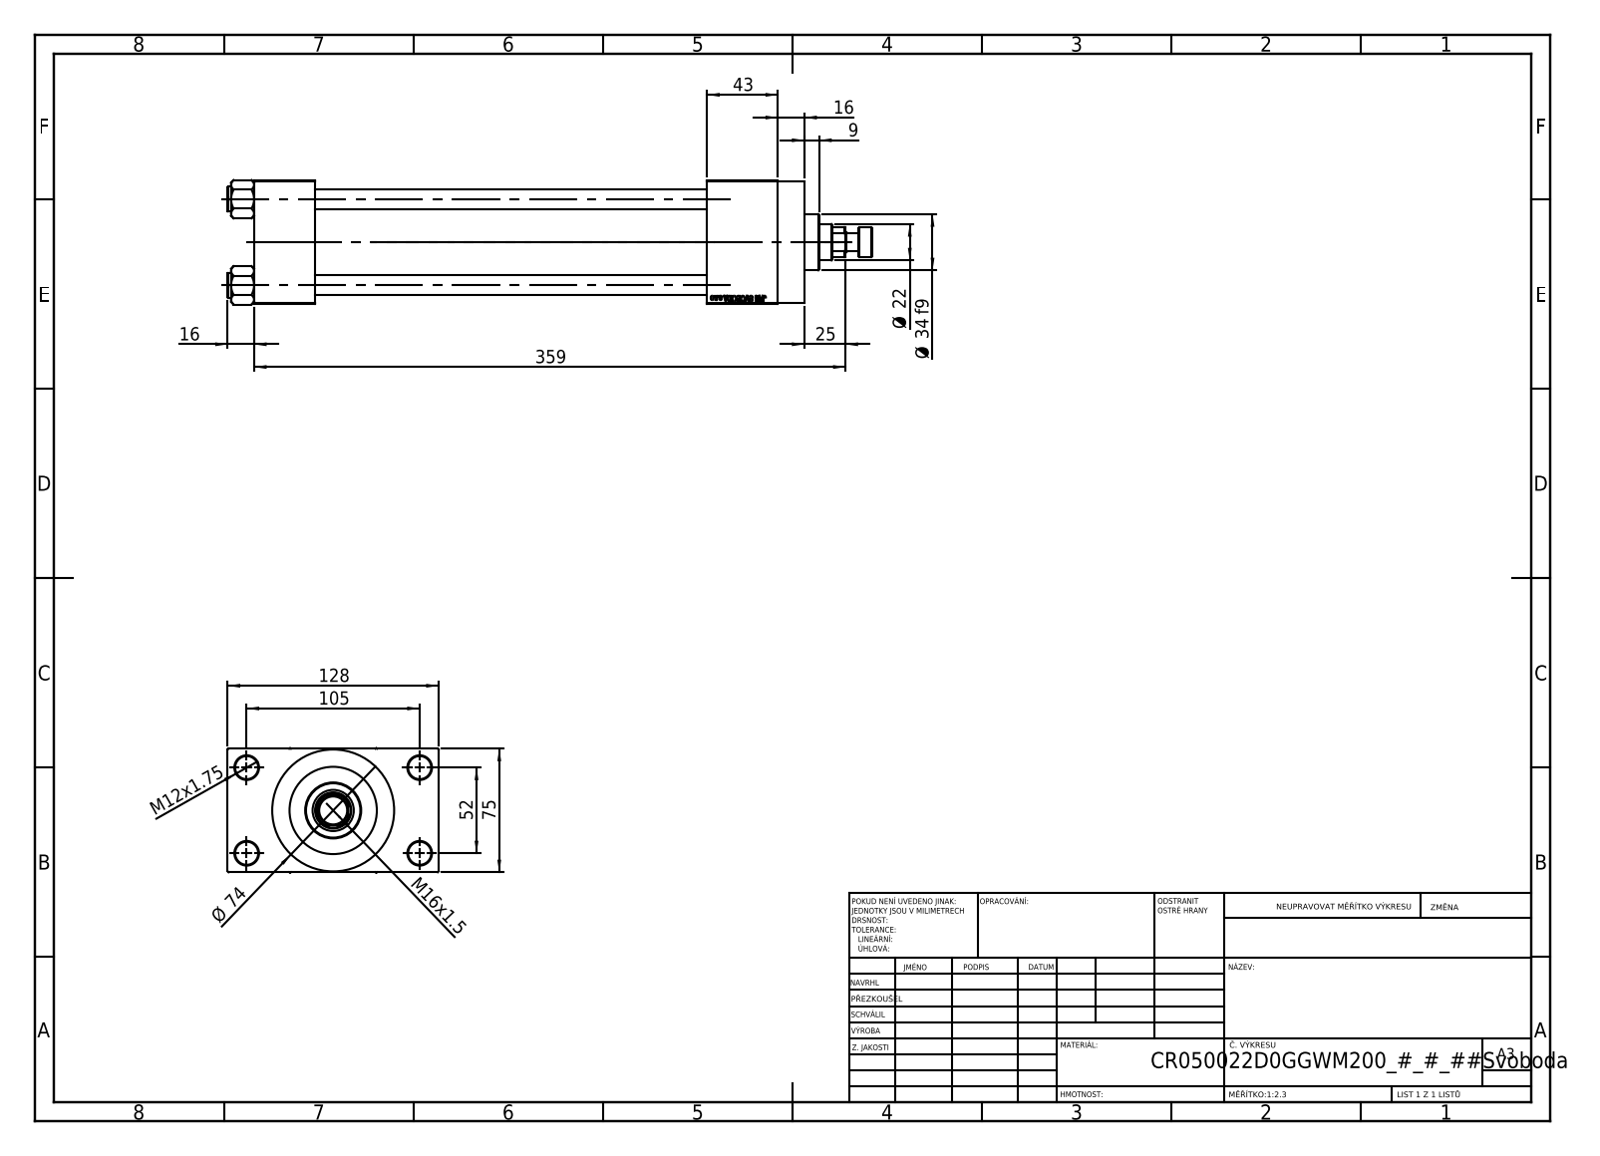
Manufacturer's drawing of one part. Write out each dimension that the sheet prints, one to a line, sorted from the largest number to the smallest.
359
128
105
75
Ø 74
52
43
Ø 34 f9
25
Ø 22
16
16
M16x1.5
M12x1.75
9
